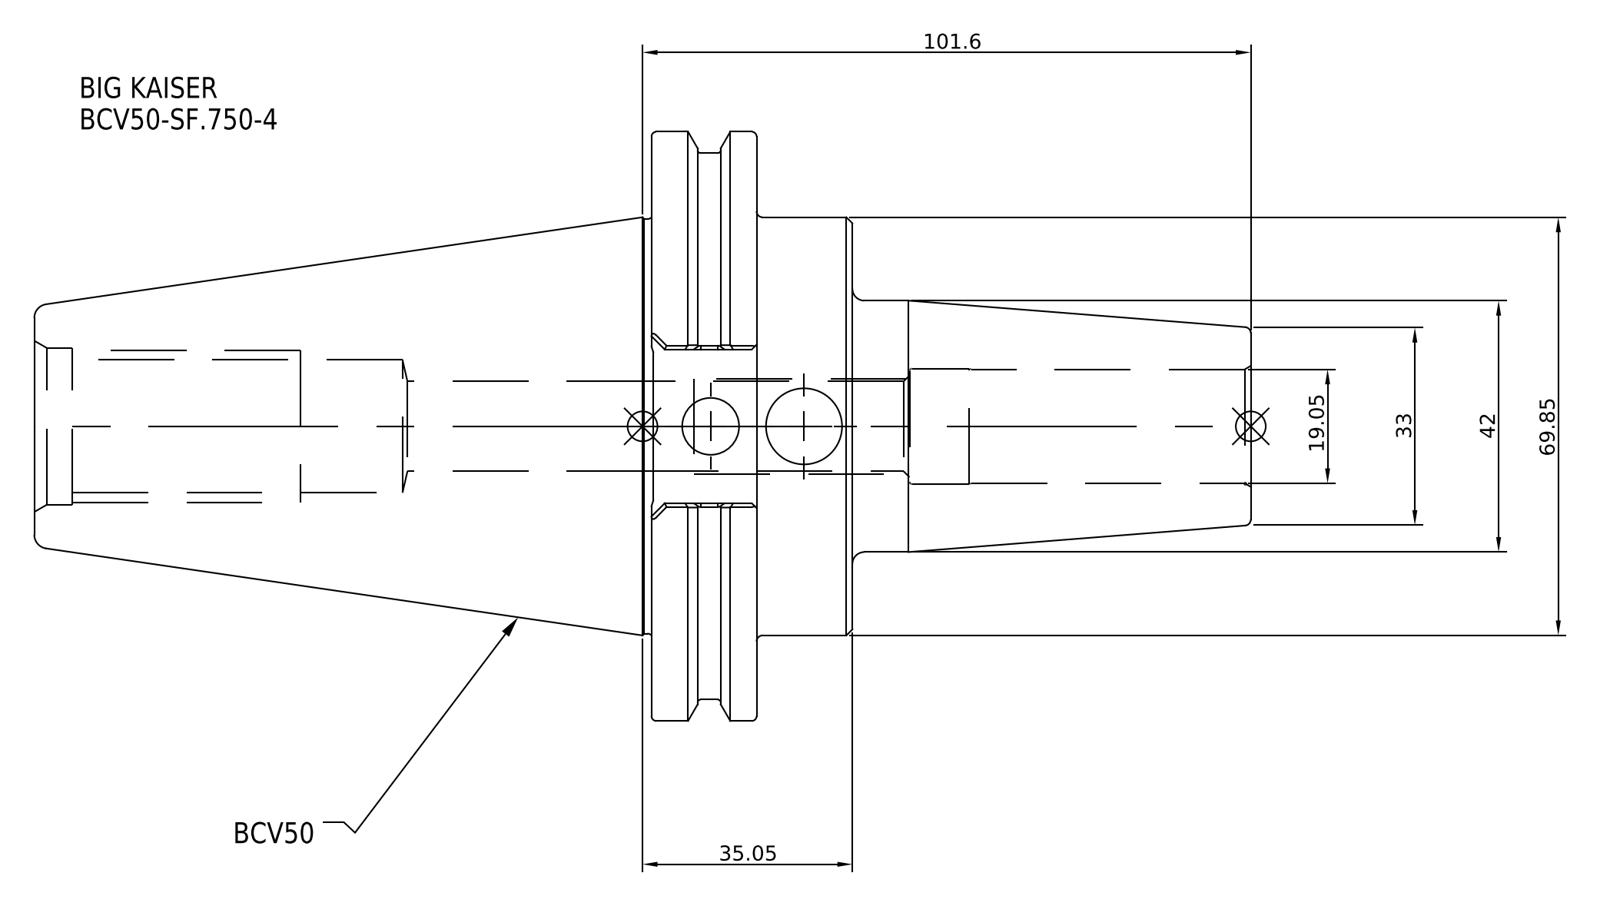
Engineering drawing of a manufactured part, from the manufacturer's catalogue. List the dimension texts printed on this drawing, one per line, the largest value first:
101.6
69.85
42
35.05
33
19.05
